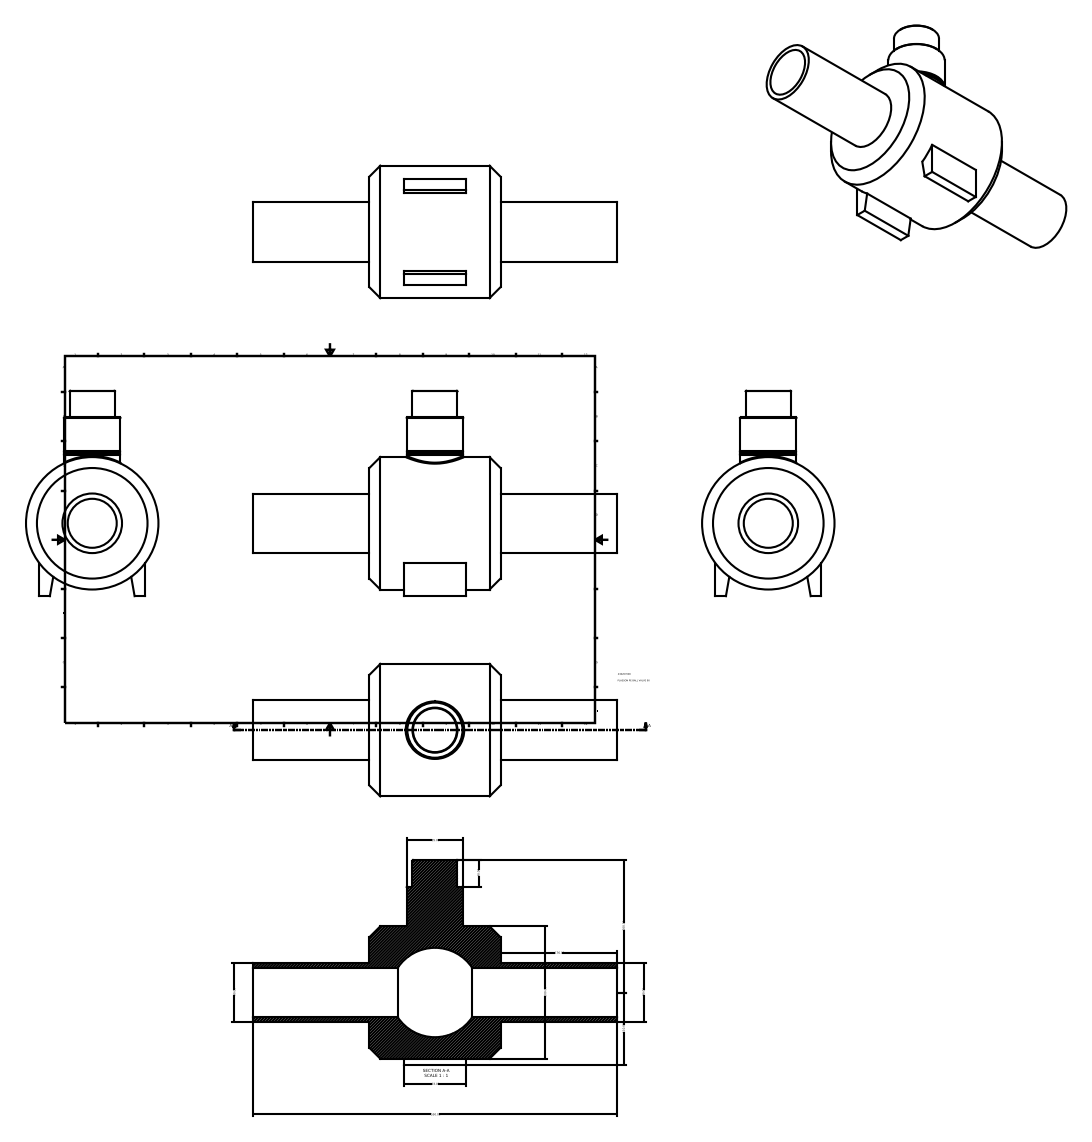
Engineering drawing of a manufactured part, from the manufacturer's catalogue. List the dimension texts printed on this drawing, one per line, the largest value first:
550.00
200.00
200.00
176.00
110.00
93.00
90.00
90.00
85.00
40.00
